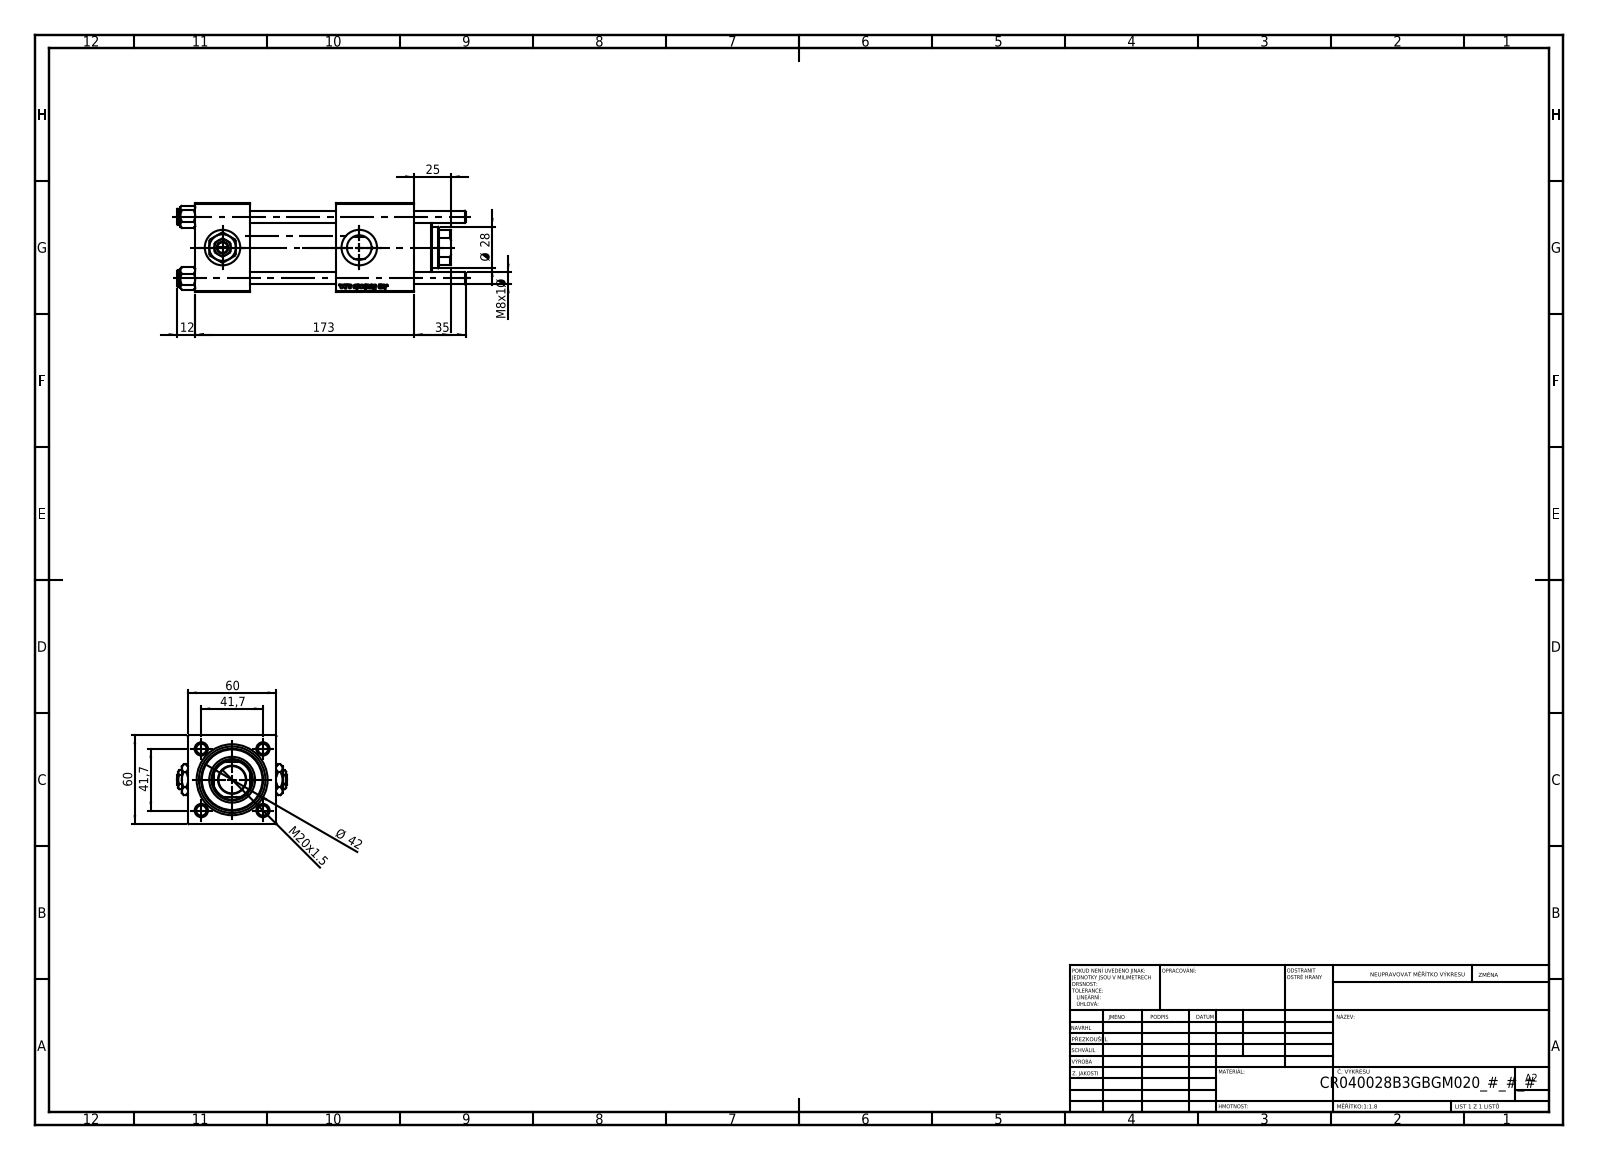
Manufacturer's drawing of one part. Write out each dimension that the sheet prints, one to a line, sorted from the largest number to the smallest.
173
60
60
Ø 42
41,7
41,7
35
Ø 28
25
M20x1.5
12
M8x1 Ø
